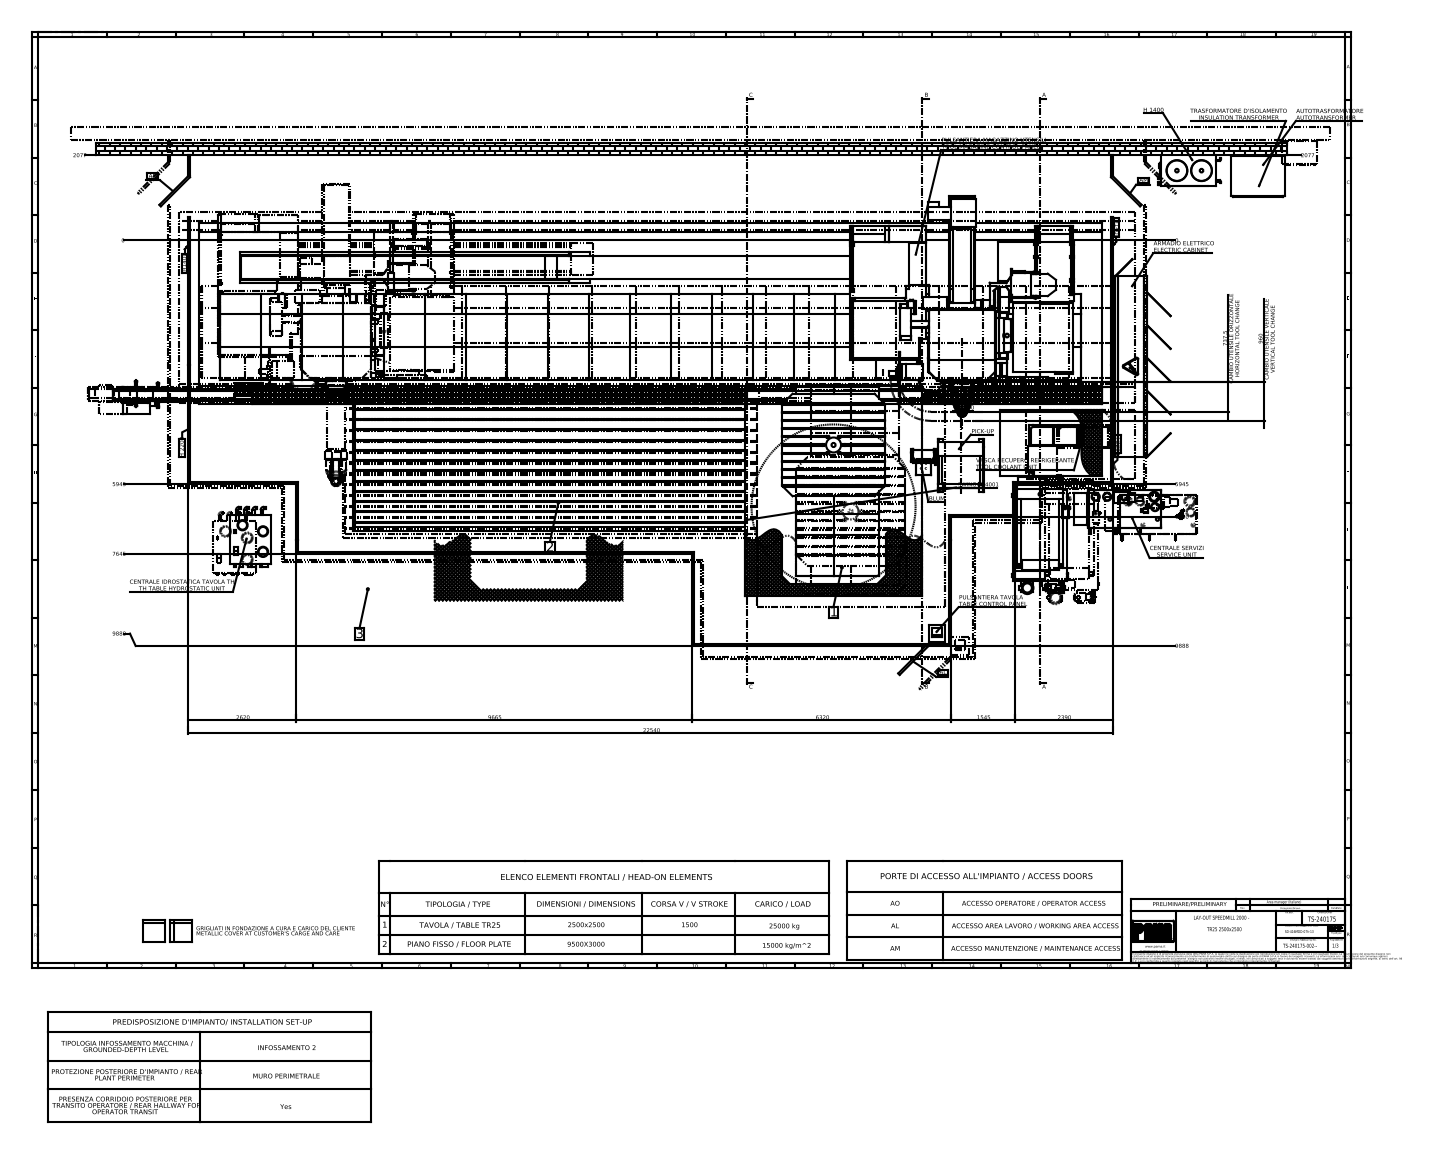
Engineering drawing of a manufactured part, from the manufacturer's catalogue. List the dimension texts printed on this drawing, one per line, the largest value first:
22540
9888
9888
9665
7645
6740
6320
5945
5945
SWING= Ø 4001
2620
2390
2077
2077
1545
960 CAMBIO UTENSILE VERTICALE VERTICAL TOOL CHANGE
737,5 CAMBIO UTENSILE ORIZZONTALE HORIZONTAL TOOL CHANGE
30
0
0
